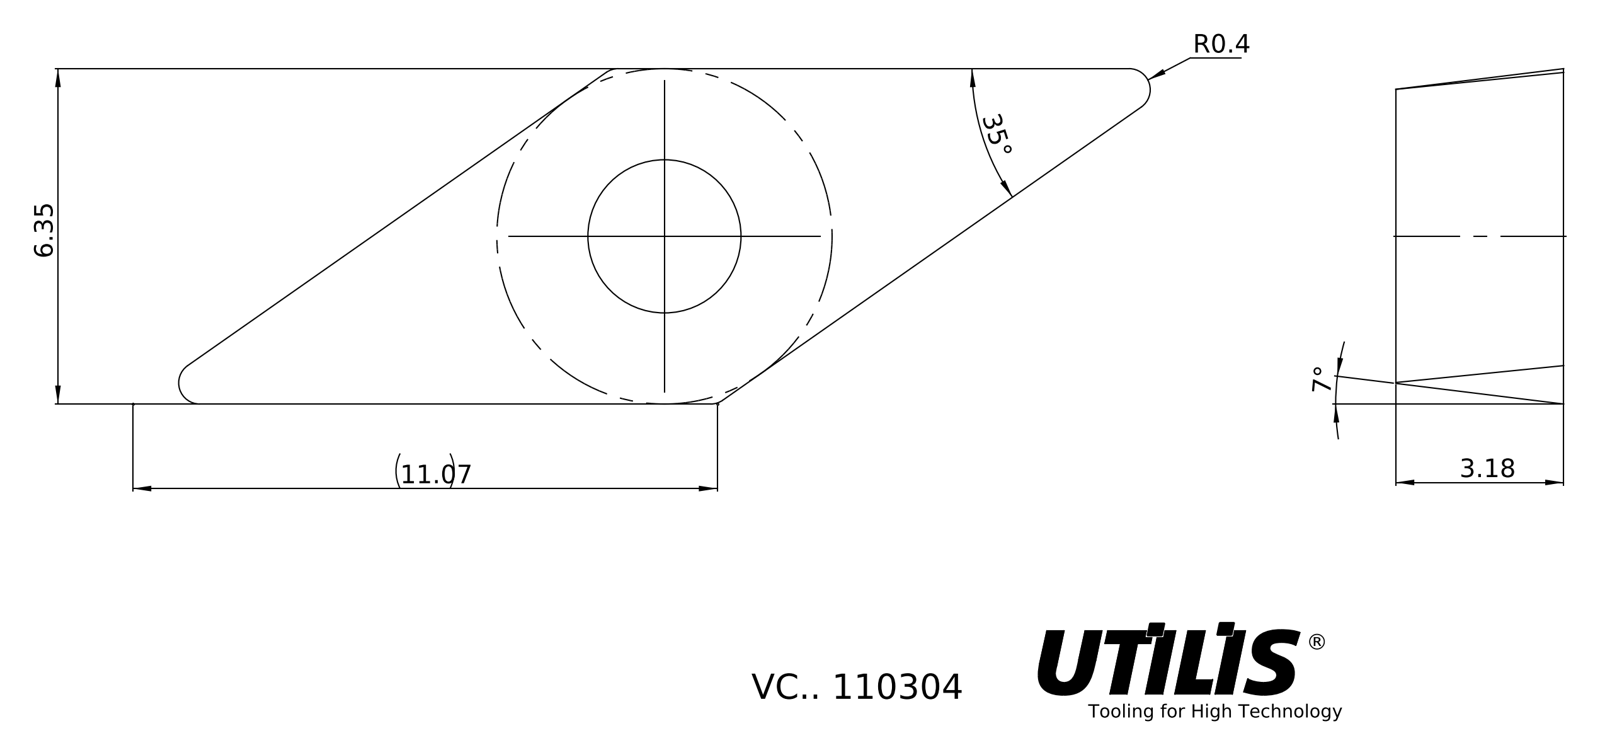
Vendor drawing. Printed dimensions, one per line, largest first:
35°
11.07
6.35
3.18
R0.4
